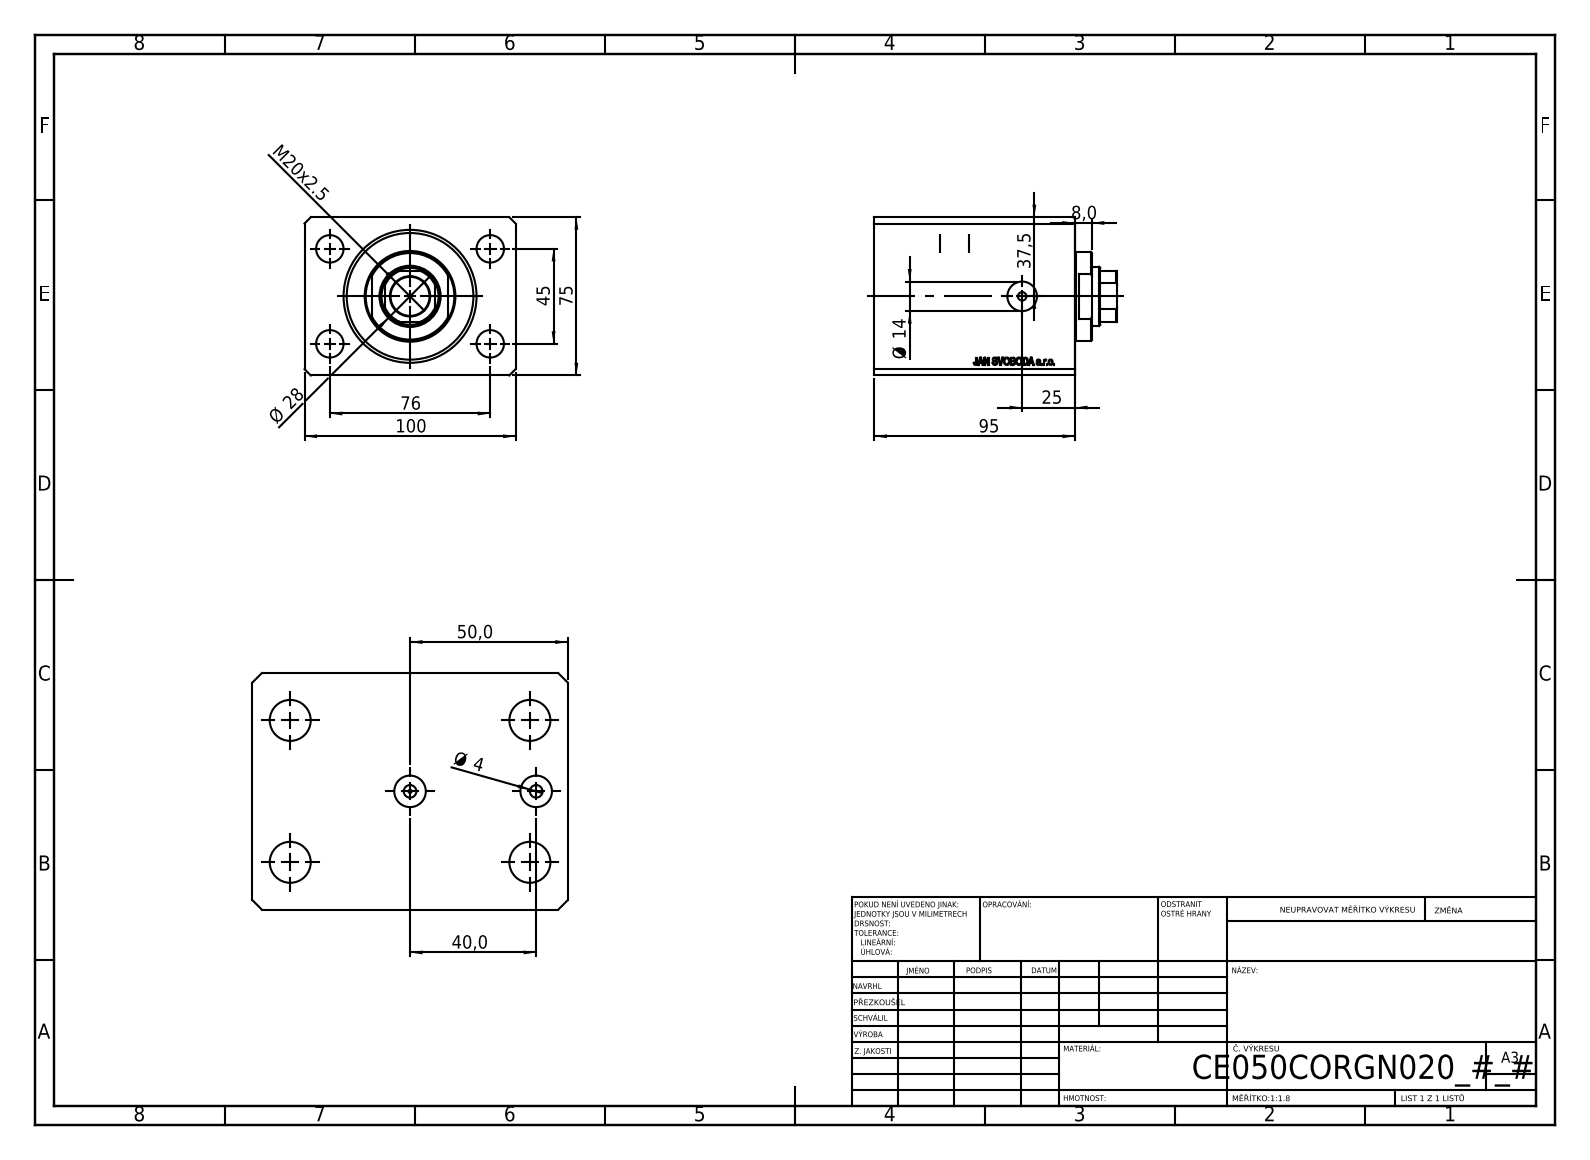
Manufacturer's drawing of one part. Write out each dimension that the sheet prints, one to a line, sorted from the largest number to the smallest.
100
95
76
75
50,0
45
40,0
37,5
Ø 28
25
M20x2.5
Ø 14
8,0
Ø 4
